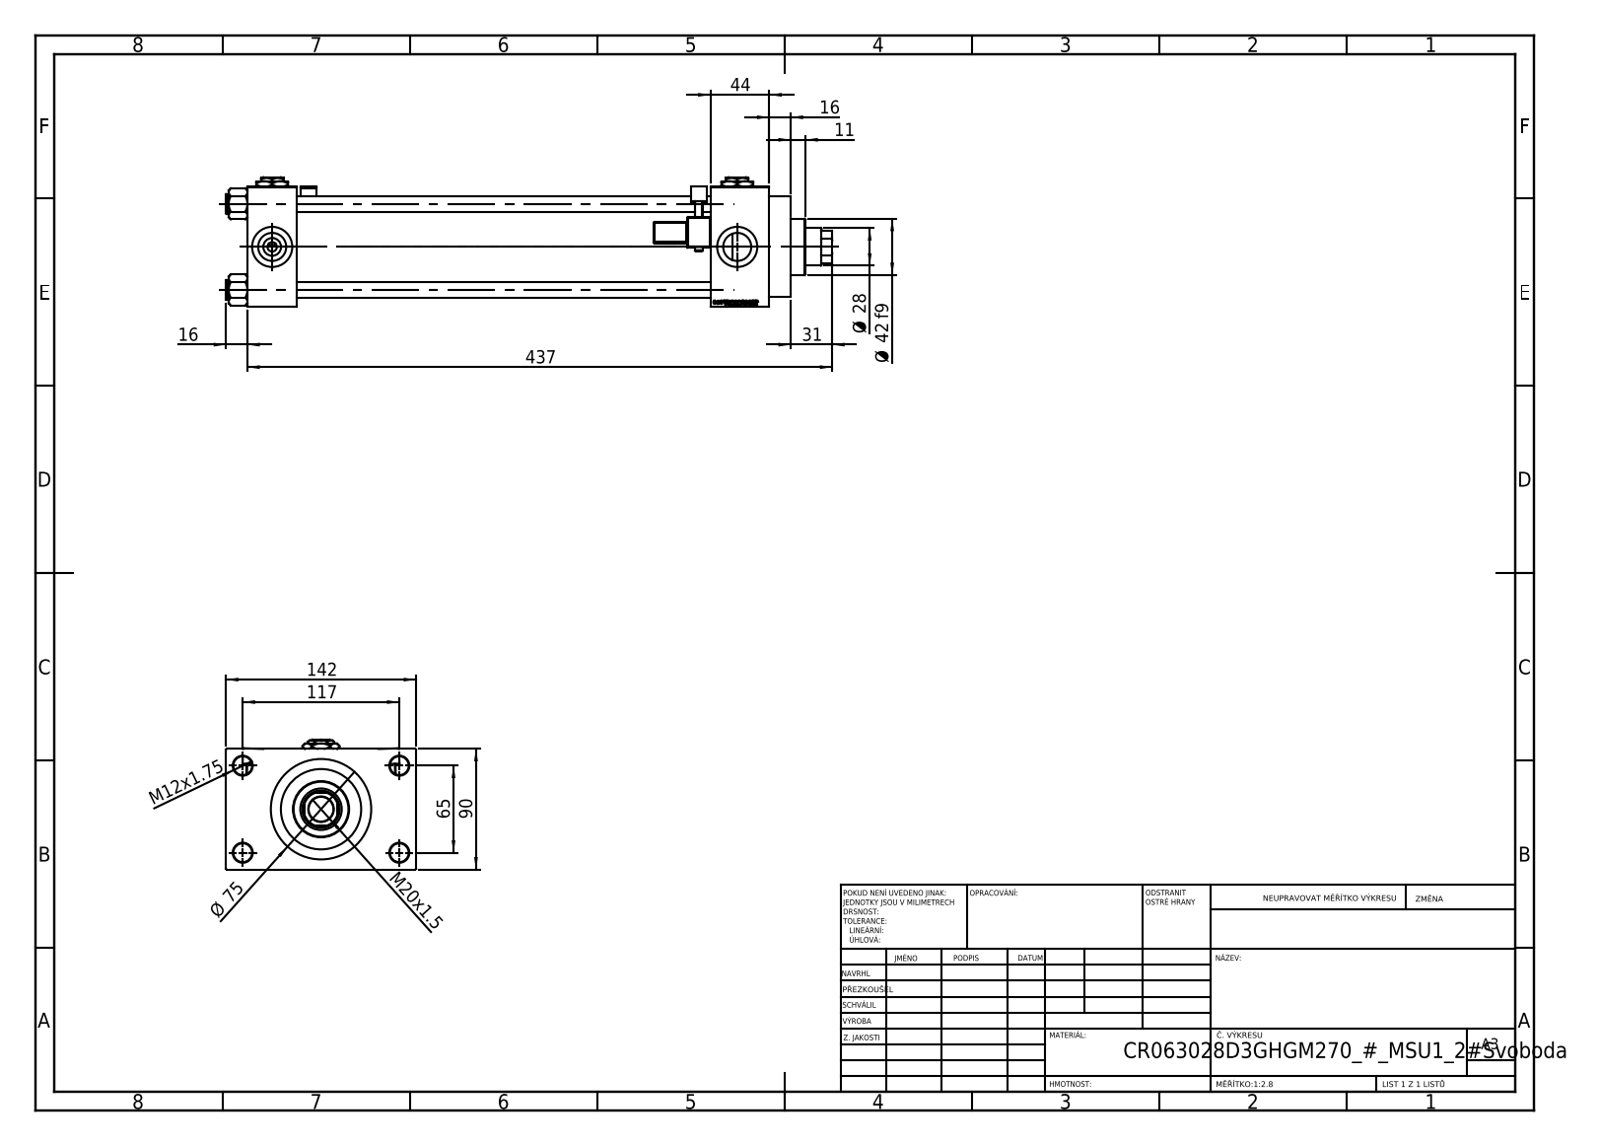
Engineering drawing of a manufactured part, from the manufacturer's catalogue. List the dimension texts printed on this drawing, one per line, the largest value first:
437
142
117
90
Ø 75
65
44
Ø 42 f9
31
Ø 28
M20x1.5
16
16
M12x1.75
11
